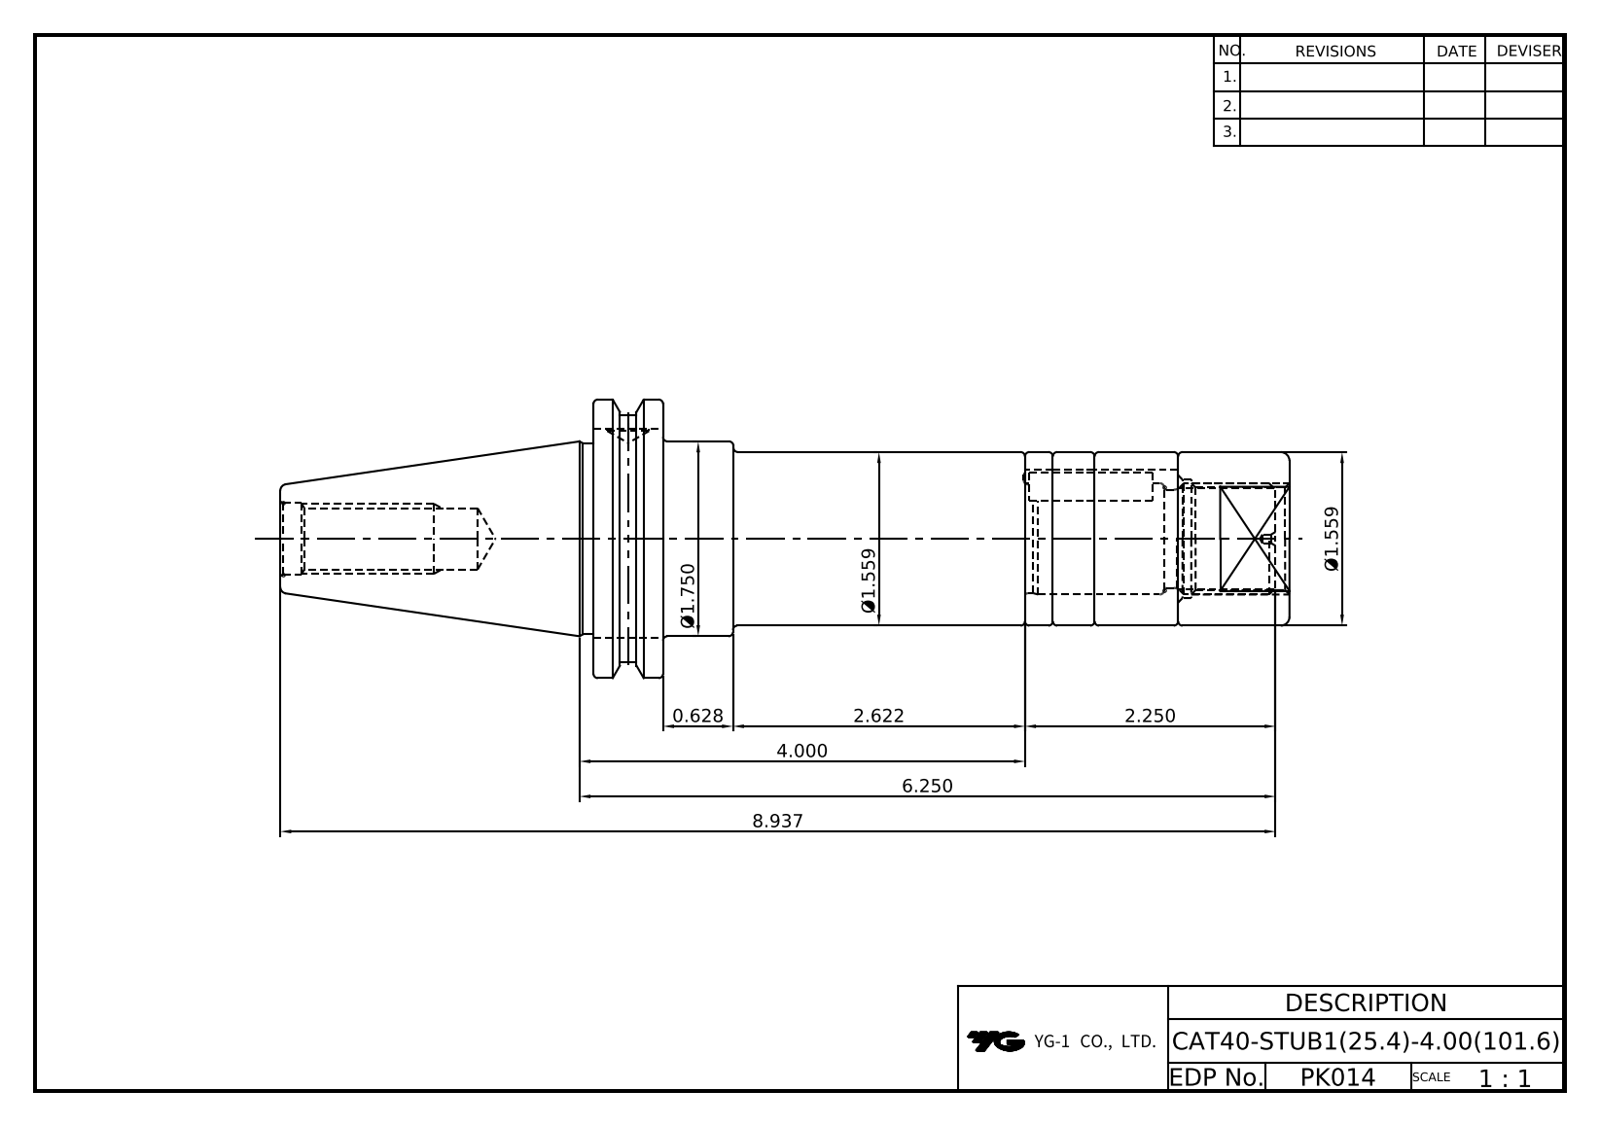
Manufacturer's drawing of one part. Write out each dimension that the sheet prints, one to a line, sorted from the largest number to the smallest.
8.937
6.250
4.000
2.622
2.250
Ø1.750
Ø1.559
Ø1.559
0.628
